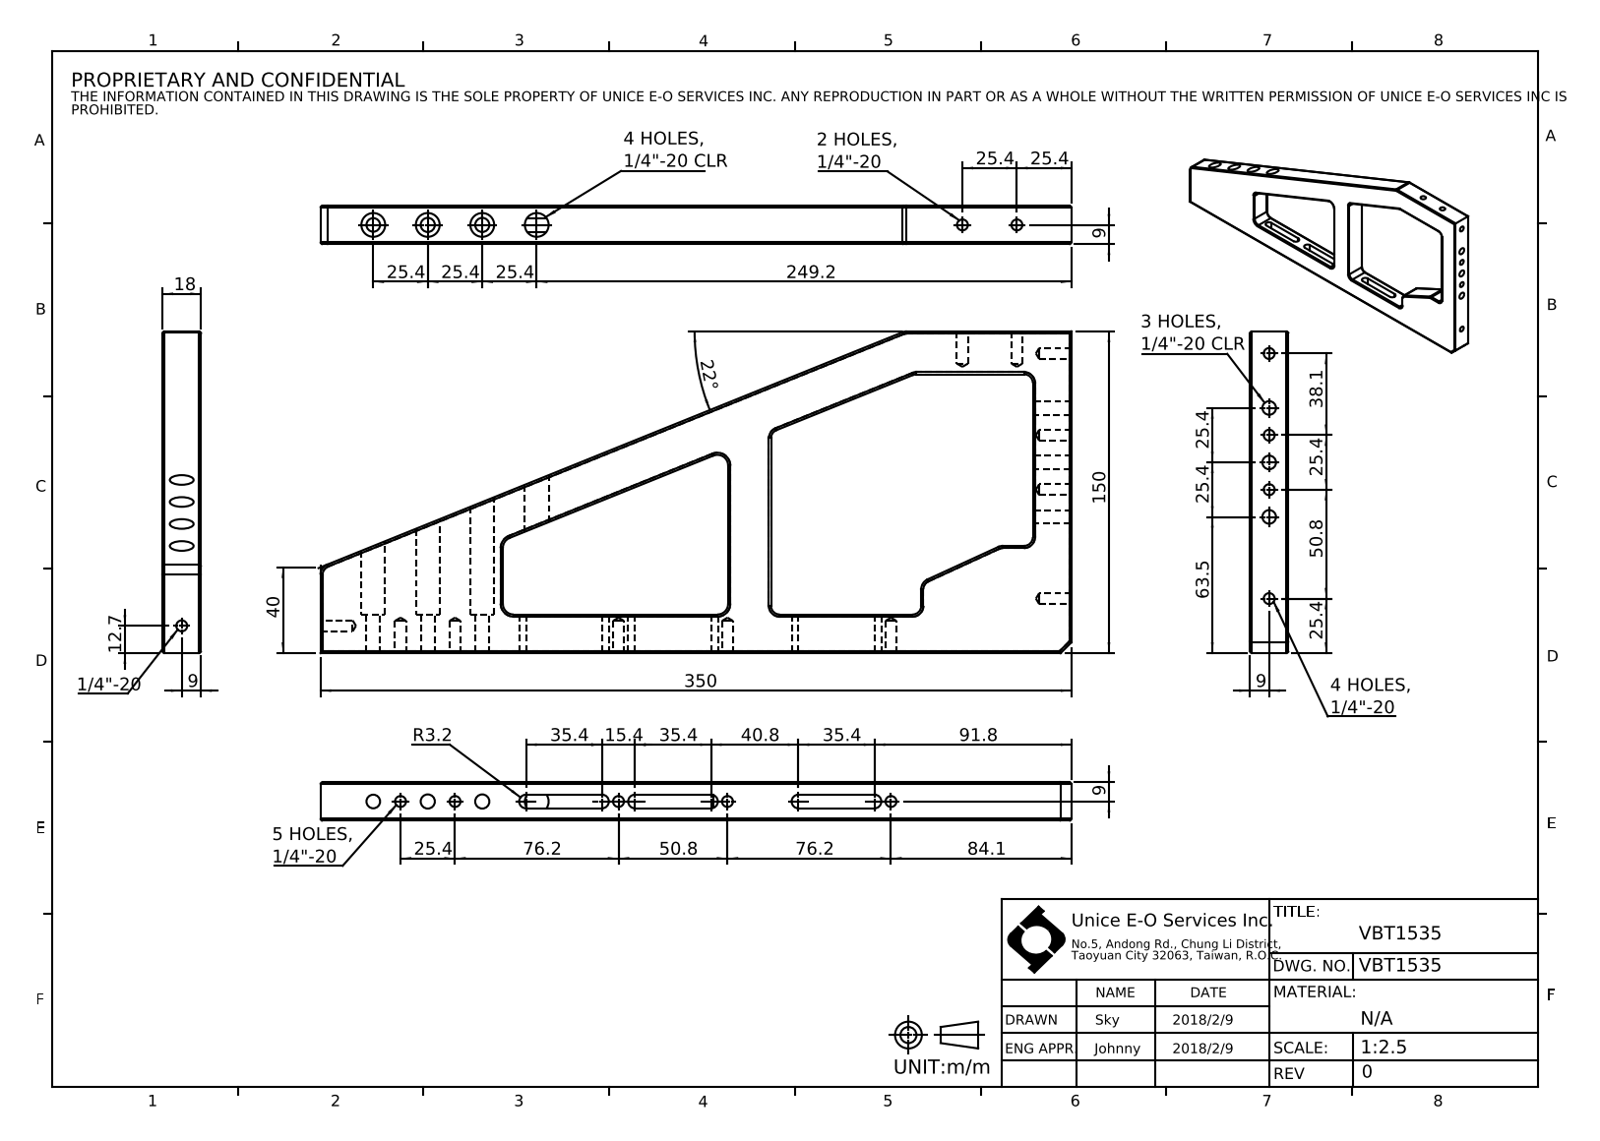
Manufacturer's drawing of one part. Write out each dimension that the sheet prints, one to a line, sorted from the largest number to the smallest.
350
249.2
150
91.8
84.1
76.2
76.2
63.5
50.8
50.8
40.8
40
38.1
35.4
35.4
35.4
25.4
25.4
25.4
25.4
25.4
25.4
25.4
25.4
25.4
25.4
22°
18
15.4
12.7
9
9
9
9
R3.2
